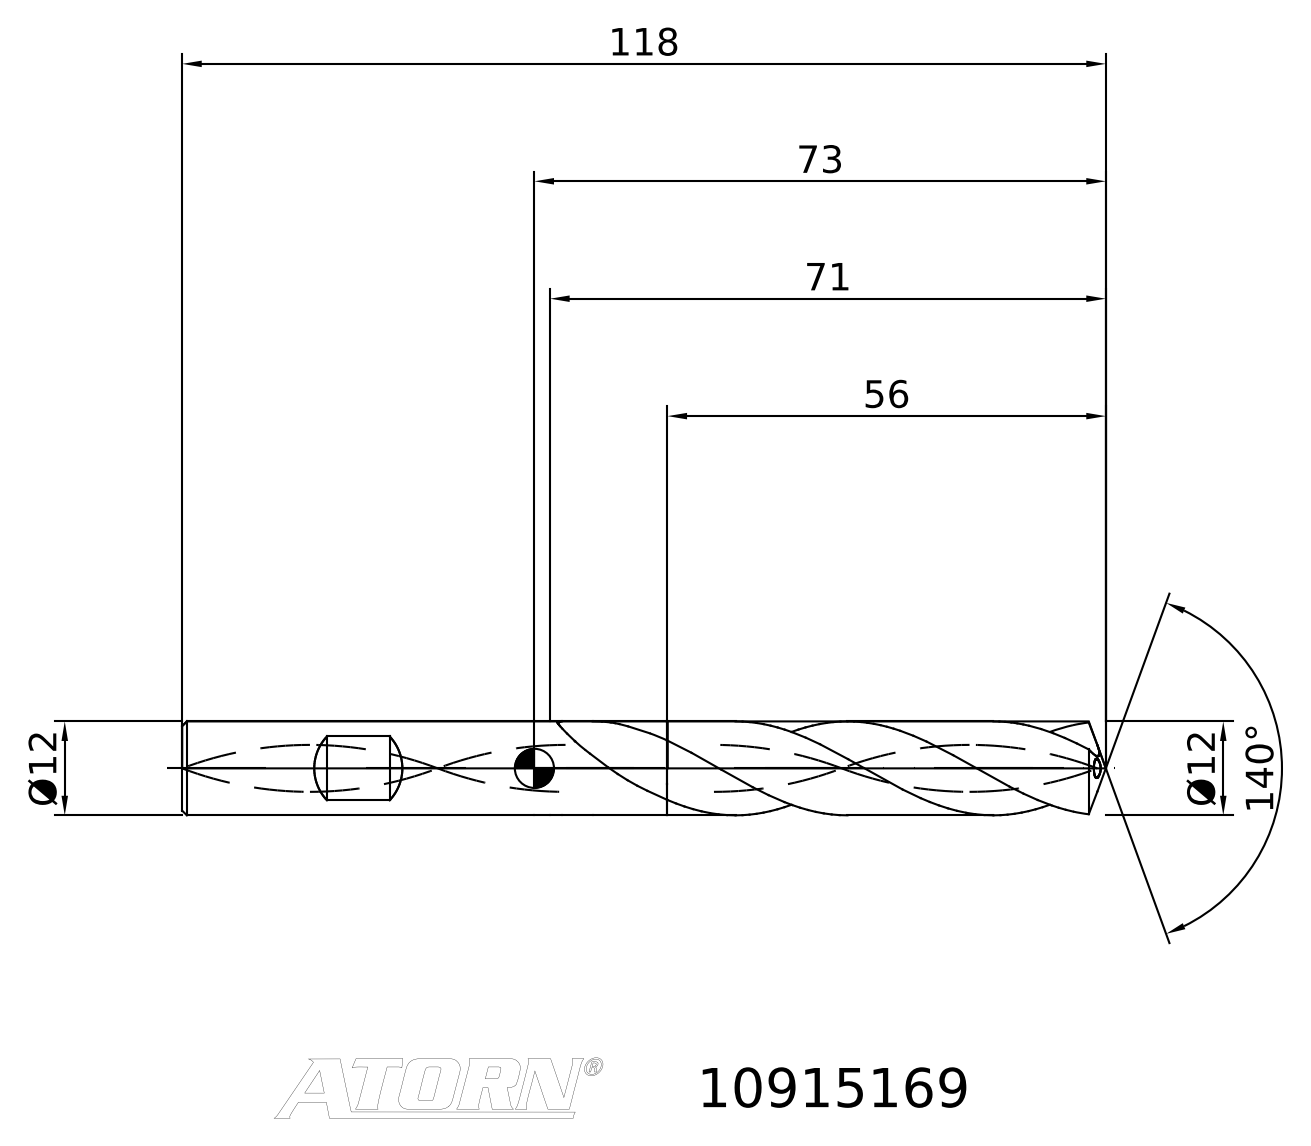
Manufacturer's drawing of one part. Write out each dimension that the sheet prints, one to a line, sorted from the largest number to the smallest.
140°
118
73
71
56
Ø12
Ø12
